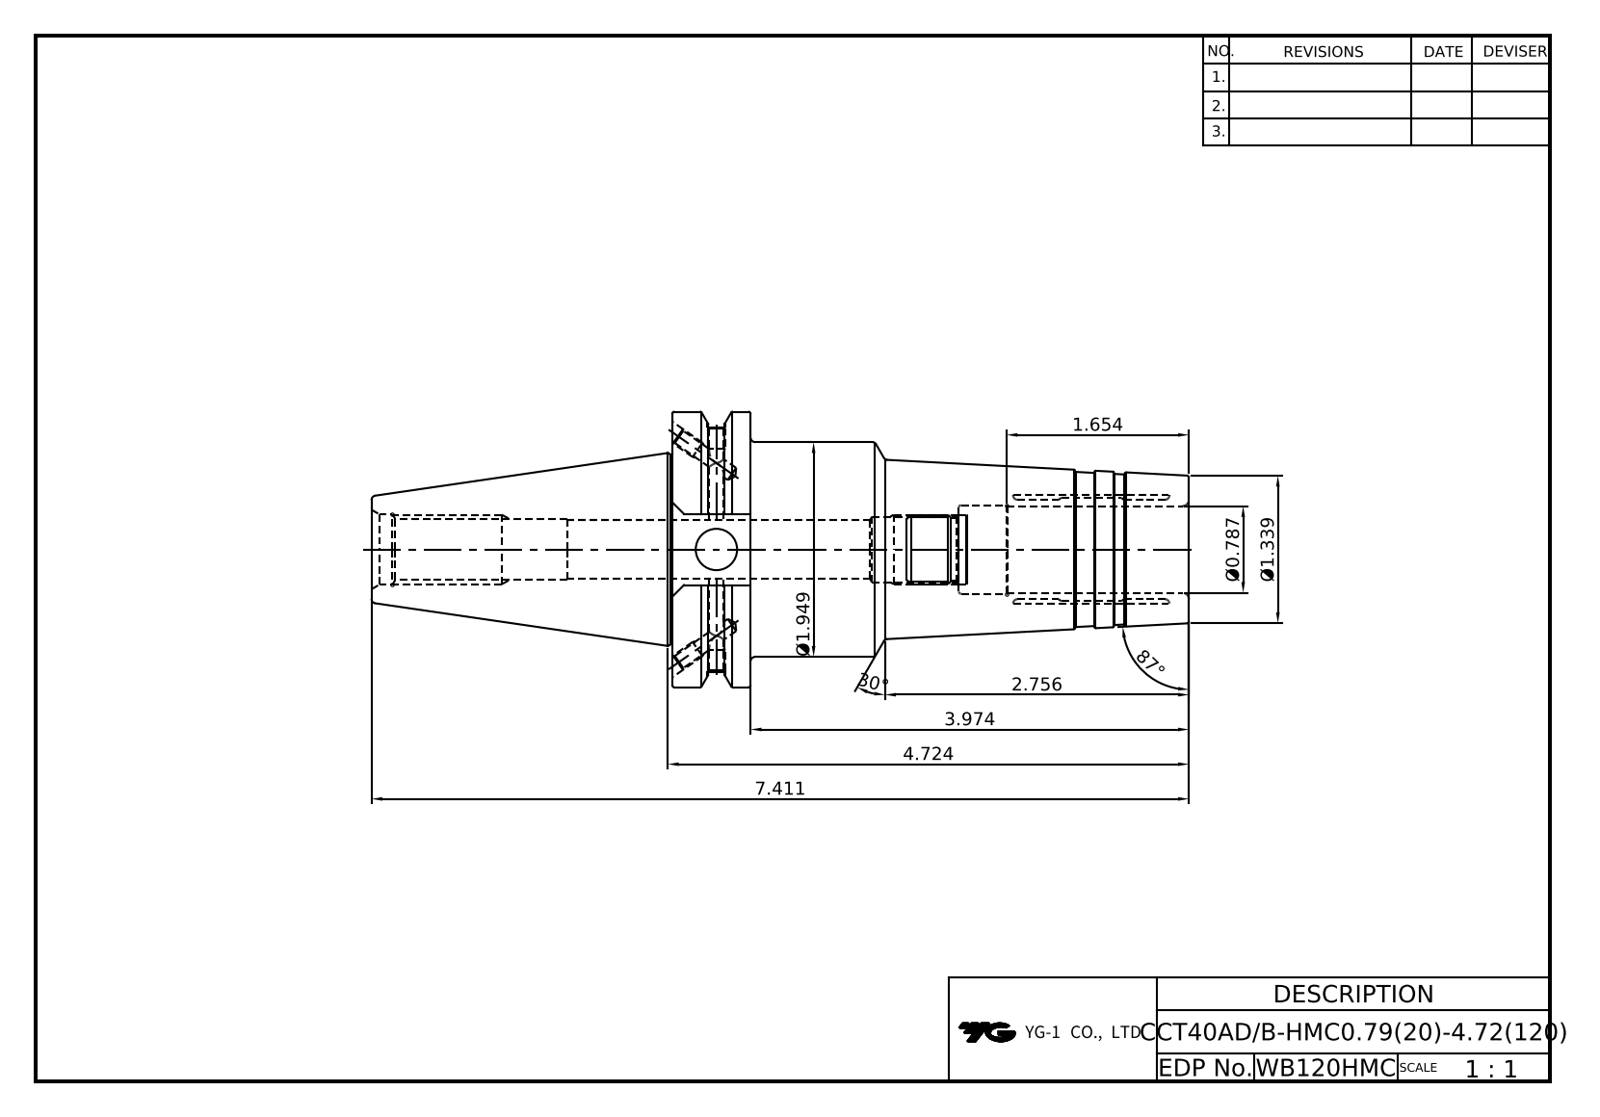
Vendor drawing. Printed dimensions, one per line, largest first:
87°
30°
7.411
4.724
3.974
2.756
Ø1.949
1.654
Ø1.339
Ø0.787
